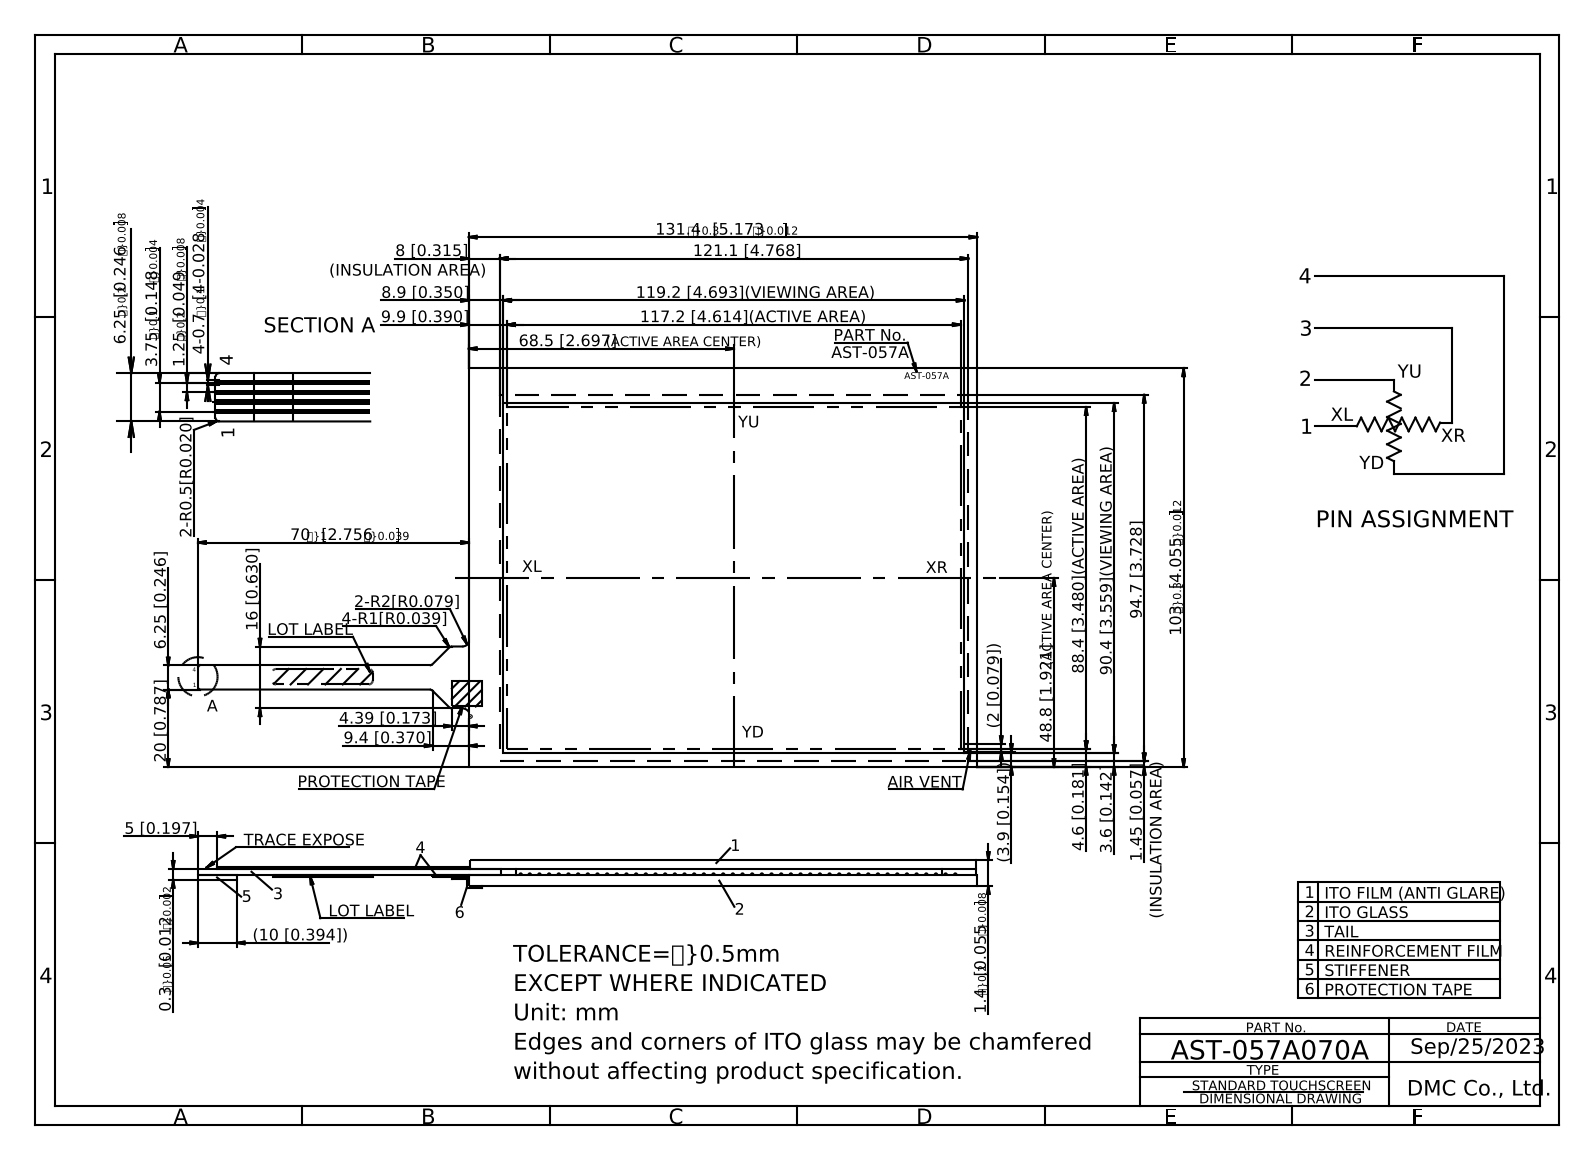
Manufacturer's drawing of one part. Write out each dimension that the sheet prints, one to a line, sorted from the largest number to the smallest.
131.40
121.1 [4.768]
119.2 [4.693](VIEWING AREA)
117.2 [4.614](ACTIVE AREA)
103.00
94.7 [3.728]
90.4 [3.559](VIEWING AREA)
88.4 [3.480](ACTIVE AREA)
70.00
68.50 {\H0.8333x;(ACTIVE AREA CENTER)}
48.80{\H0.8333x;(ACTIVE AREA CENTER)}
20 [0.787]
16 [0.630]
(10 [0.394])
9.9 [0.390]
9.4 [0.370]
8.9 [0.350]
8 [0.315]
6.25 [0.246]
5 [0.197]
4.6 [0.181]
4.39 [0.173]
(3.9 [0.154])
3.75{\H0.66667x;?}0.1}[0.148{\H0.66667x;?}0.004}]
3.6 [0.142]
(2 [0.079])
1.45 [0.057]
1.4{\H0.6667x;?}0.2}[0.055{\H0.66667x;?}0.008}]
1.25{\H0.6667x;?}0.2\H1.49993x;[0.049\H0.66667x;?}0.008\H1.49999x;]}
0.3{\H0.6667x;?}0.05}[0.012{\H0.6667x;?}0.002}]
